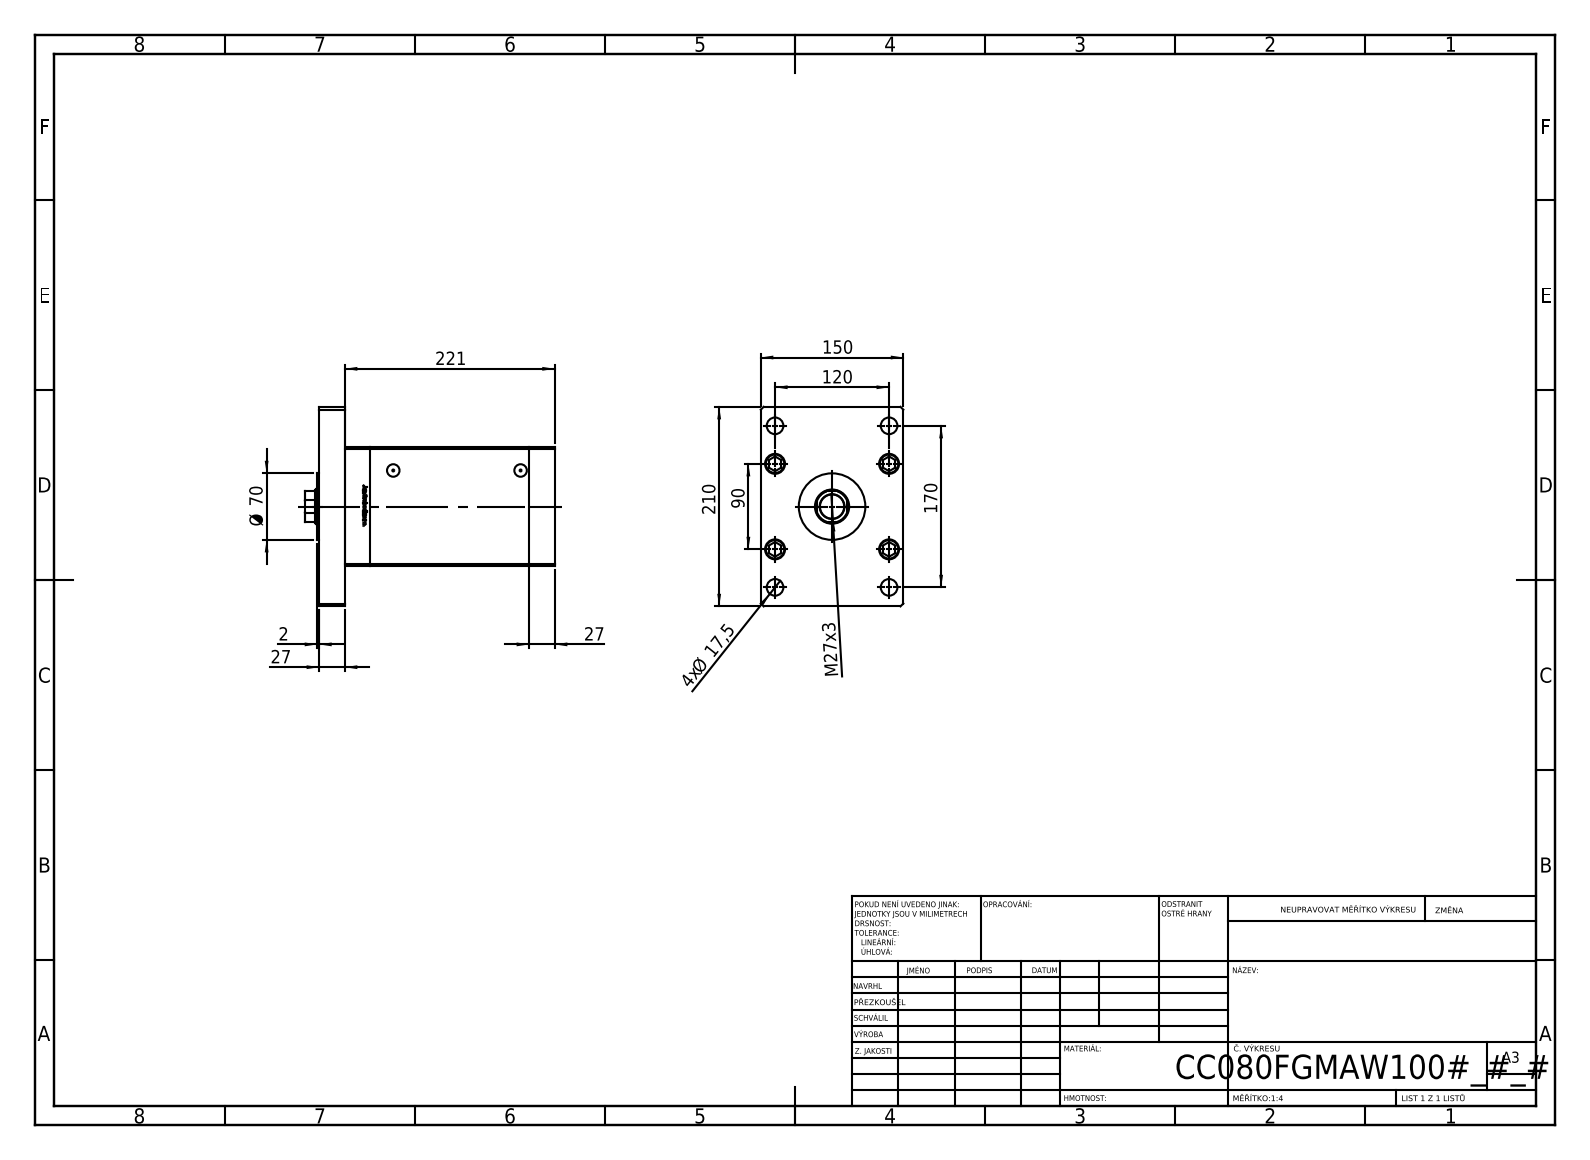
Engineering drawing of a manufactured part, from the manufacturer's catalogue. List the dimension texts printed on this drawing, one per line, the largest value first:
221
210
170
150
120
90
Ø 70
27
27
M27x3
4x Ø 17,5
2
